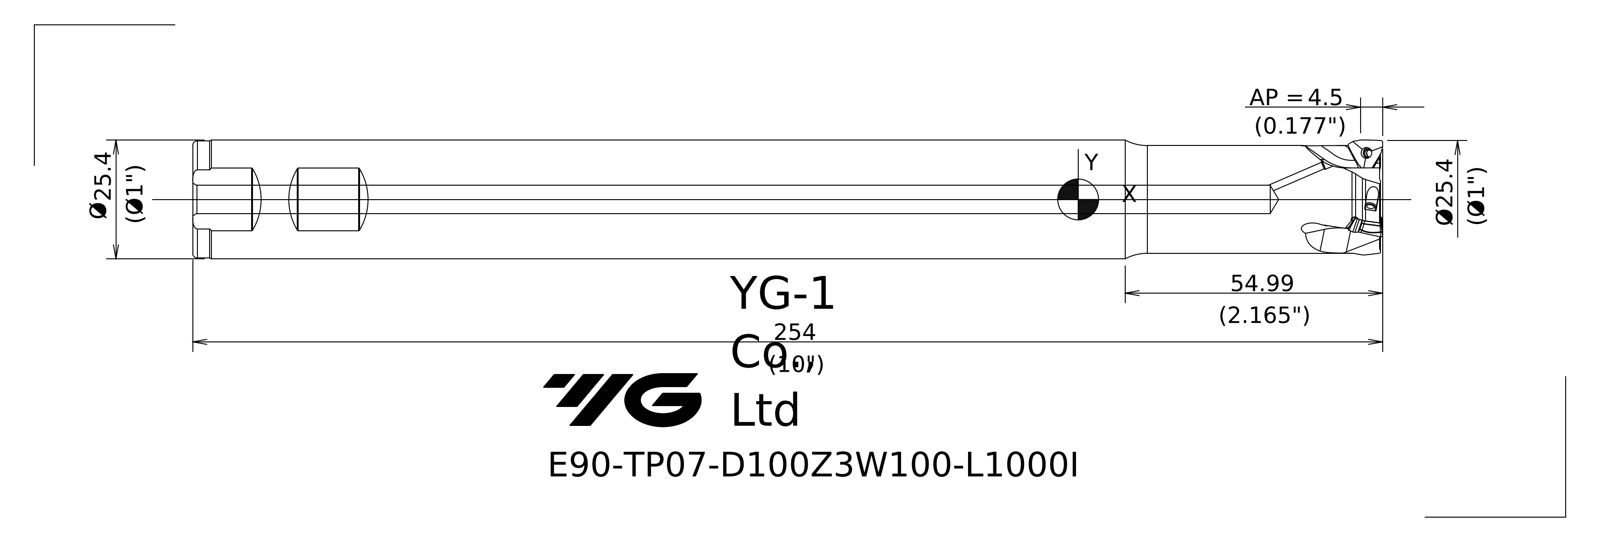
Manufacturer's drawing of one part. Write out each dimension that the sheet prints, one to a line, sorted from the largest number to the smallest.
254
54.99
Ø25.4
4.5 AP =
